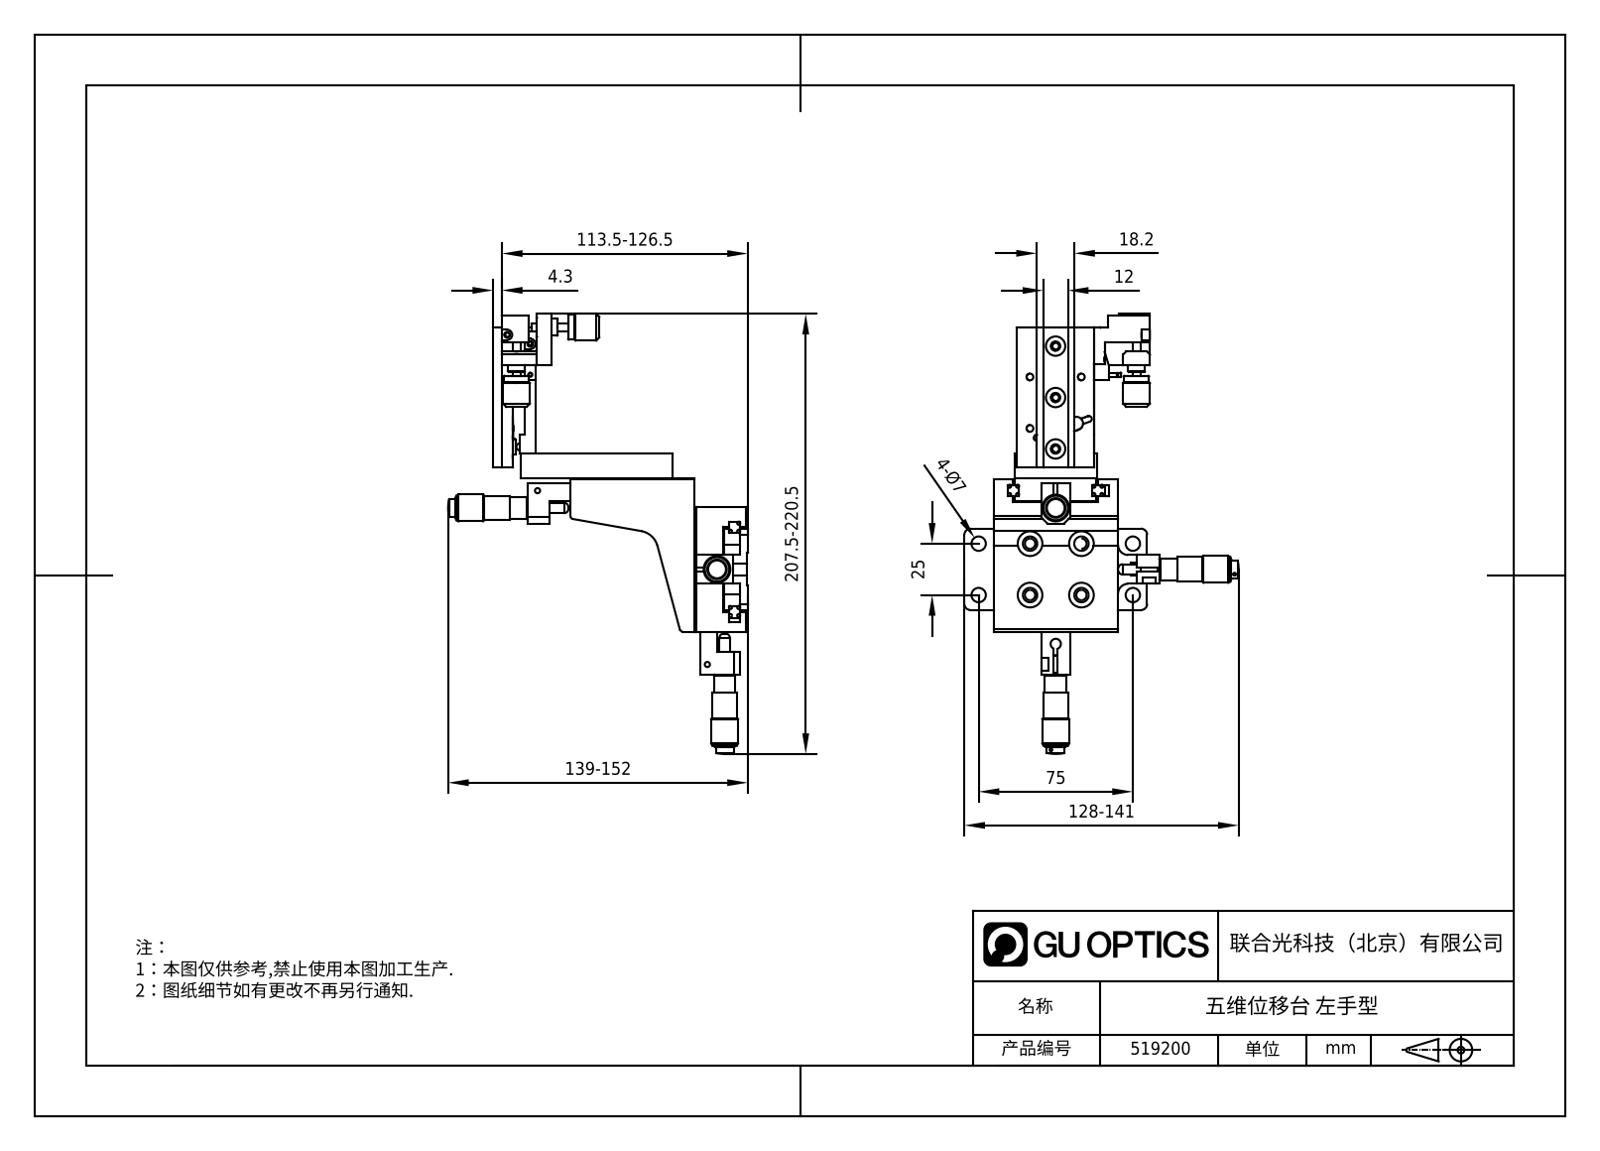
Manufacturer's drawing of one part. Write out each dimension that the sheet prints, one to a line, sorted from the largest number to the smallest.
207.5-220.5
139-152
128-141
113.5-126.5
75
25
18.2
12
4-Ø7
4.3
